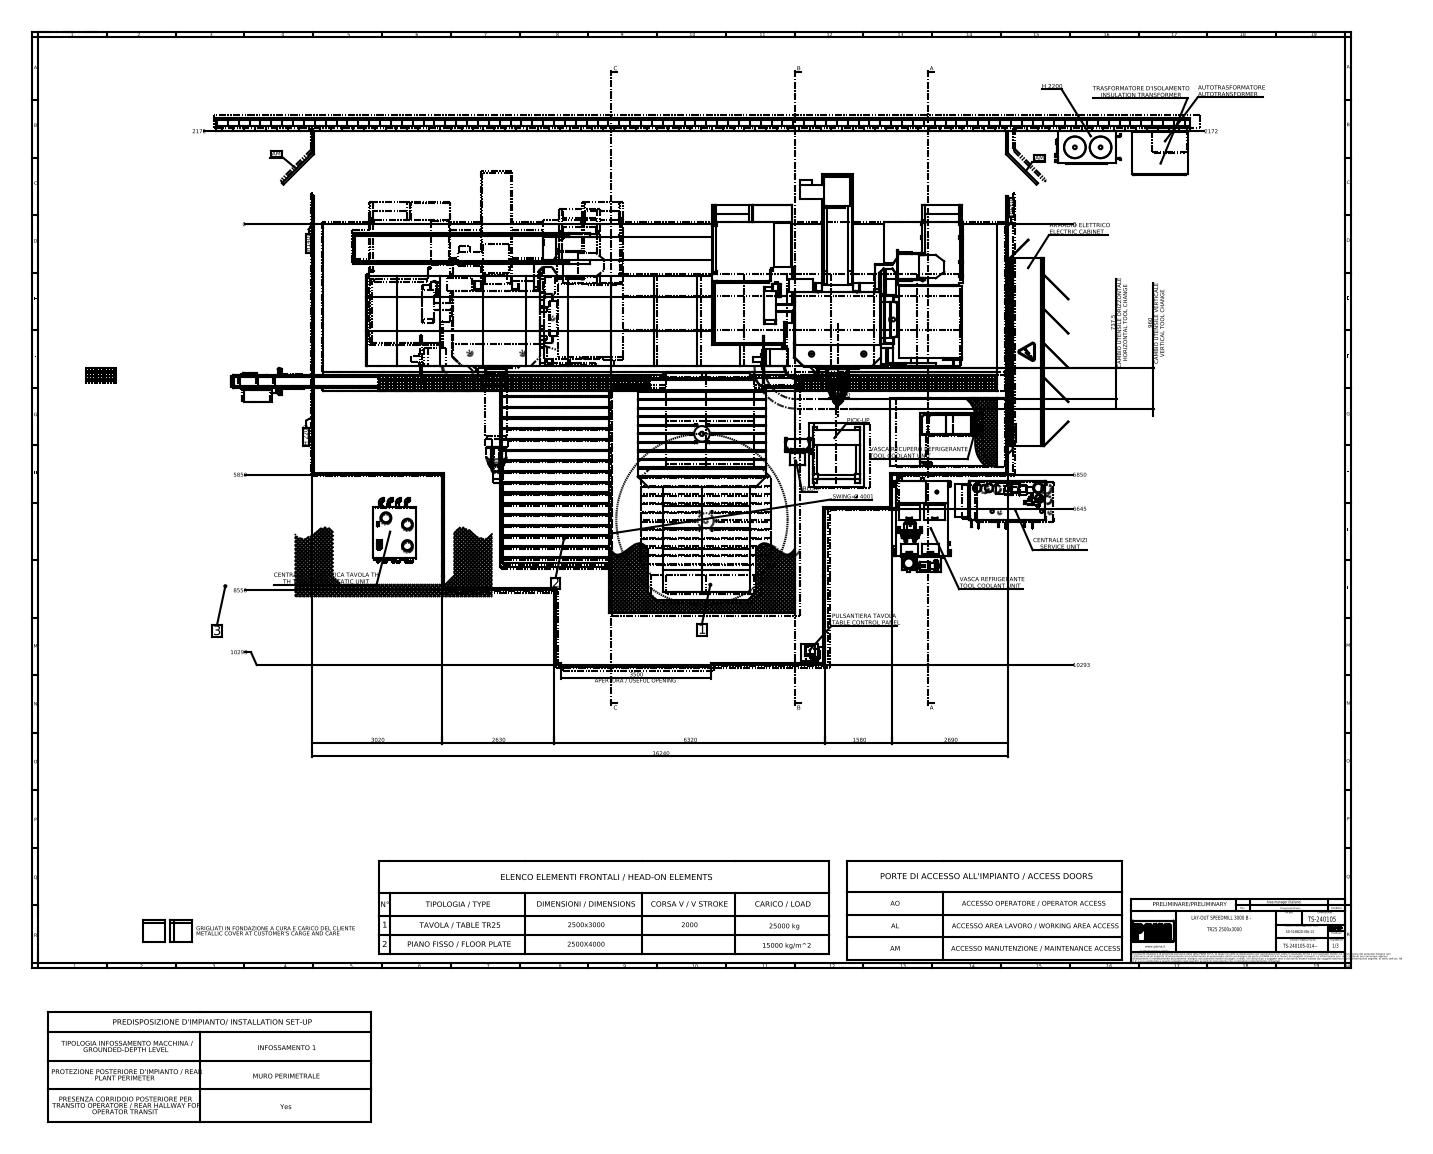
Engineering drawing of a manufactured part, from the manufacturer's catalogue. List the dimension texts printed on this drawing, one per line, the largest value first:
16240
10293
10293
8550
6645
6320
5850
5850
SWING= Ø 4001
3500 APERTURA / USEFUL OPENING
3020
2690
2630
2172
2172
1580
960 CAMBIO UTENSILE VERTICALE VERTICAL TOOL CHANGE
737,5 CAMBIO UTENSILE ORIZZONTALE HORIZONTAL TOOL CHANGE
30
0
0
